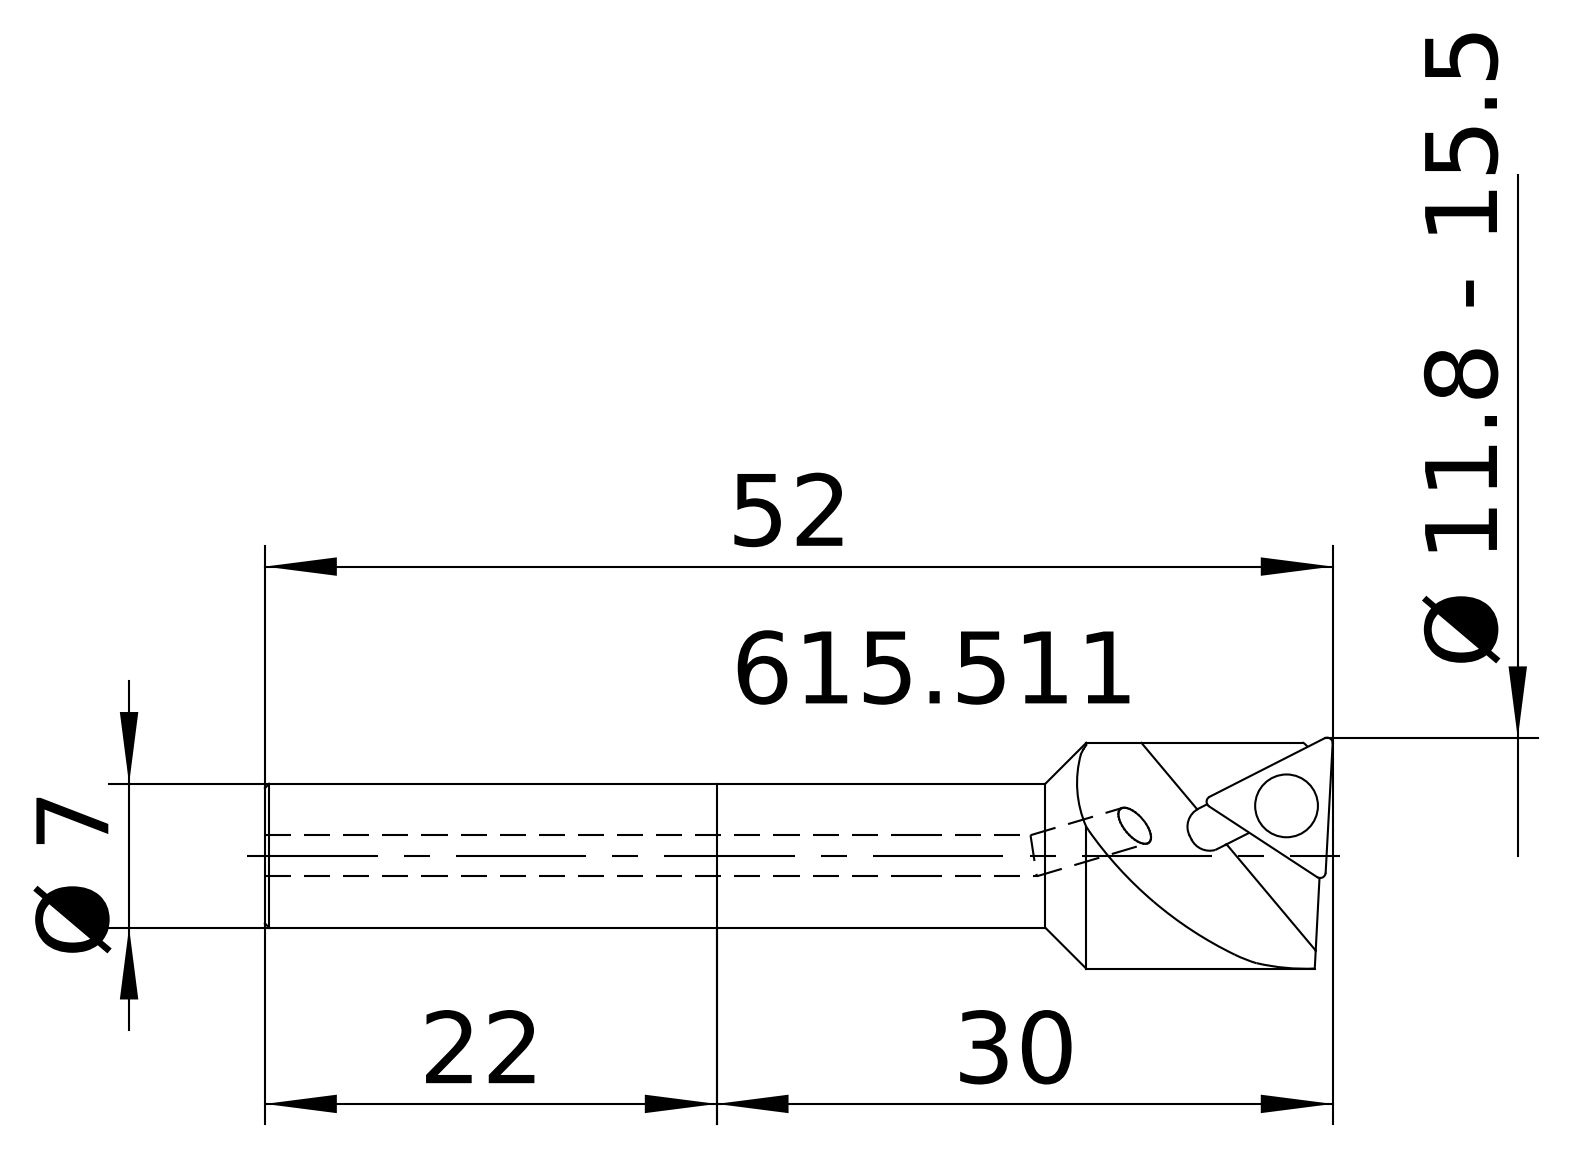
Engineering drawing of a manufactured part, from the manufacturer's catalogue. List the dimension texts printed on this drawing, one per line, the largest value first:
52
30
22
Ø 11.8 - 15.5
Ø 7
